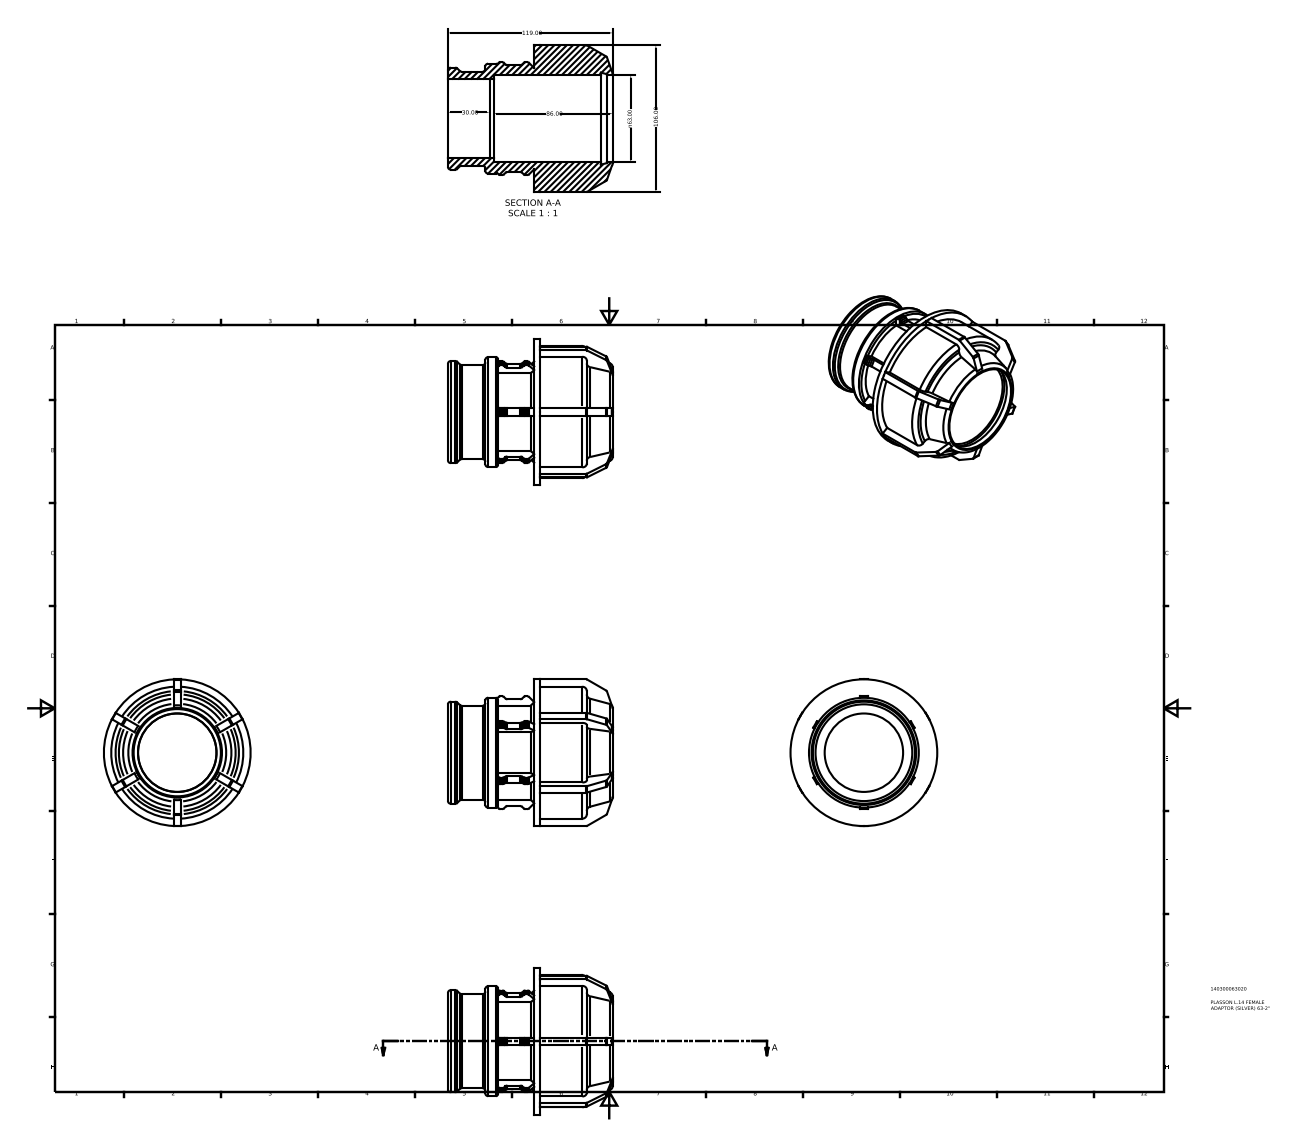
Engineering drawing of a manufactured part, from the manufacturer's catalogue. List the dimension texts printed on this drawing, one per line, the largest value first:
119.00
106.00
86.00
n63.00
30.00
